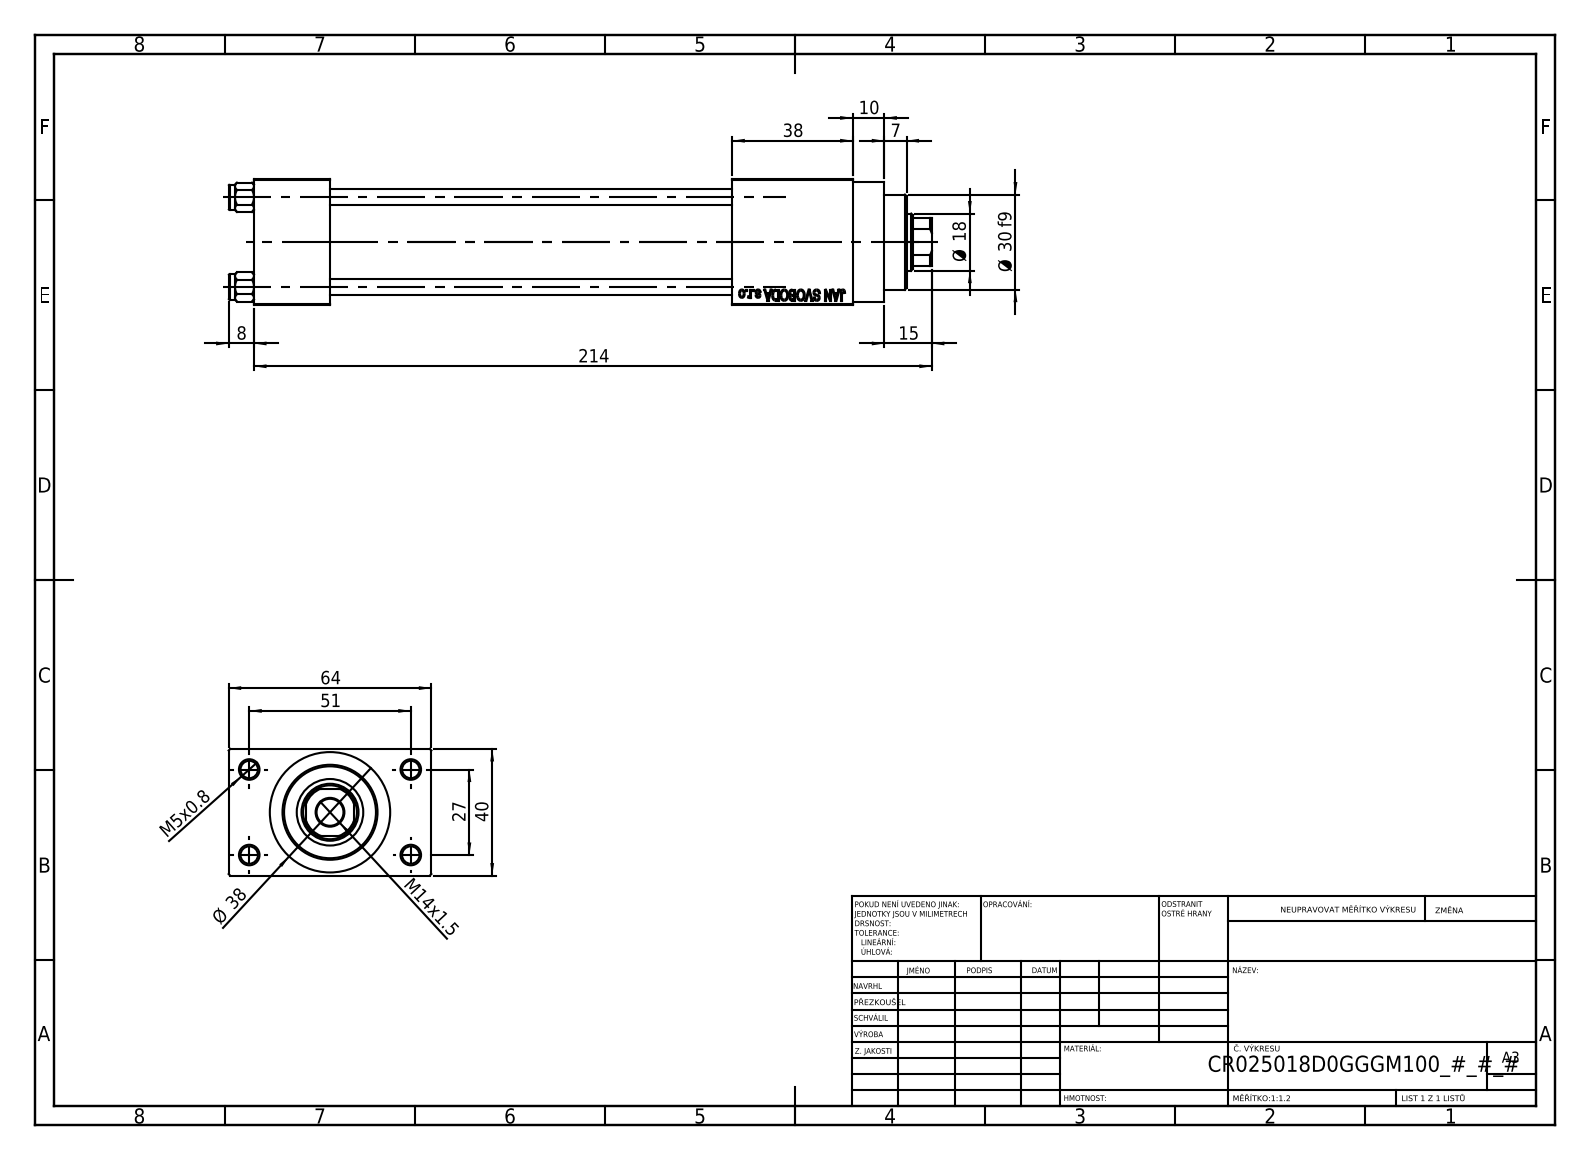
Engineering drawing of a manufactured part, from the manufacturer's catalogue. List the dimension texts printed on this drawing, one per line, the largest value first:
214
64
51
40
38
Ø 38
Ø 30 f9
27
Ø 18
15
M14x1.5
10
8
7
M5x0.8
